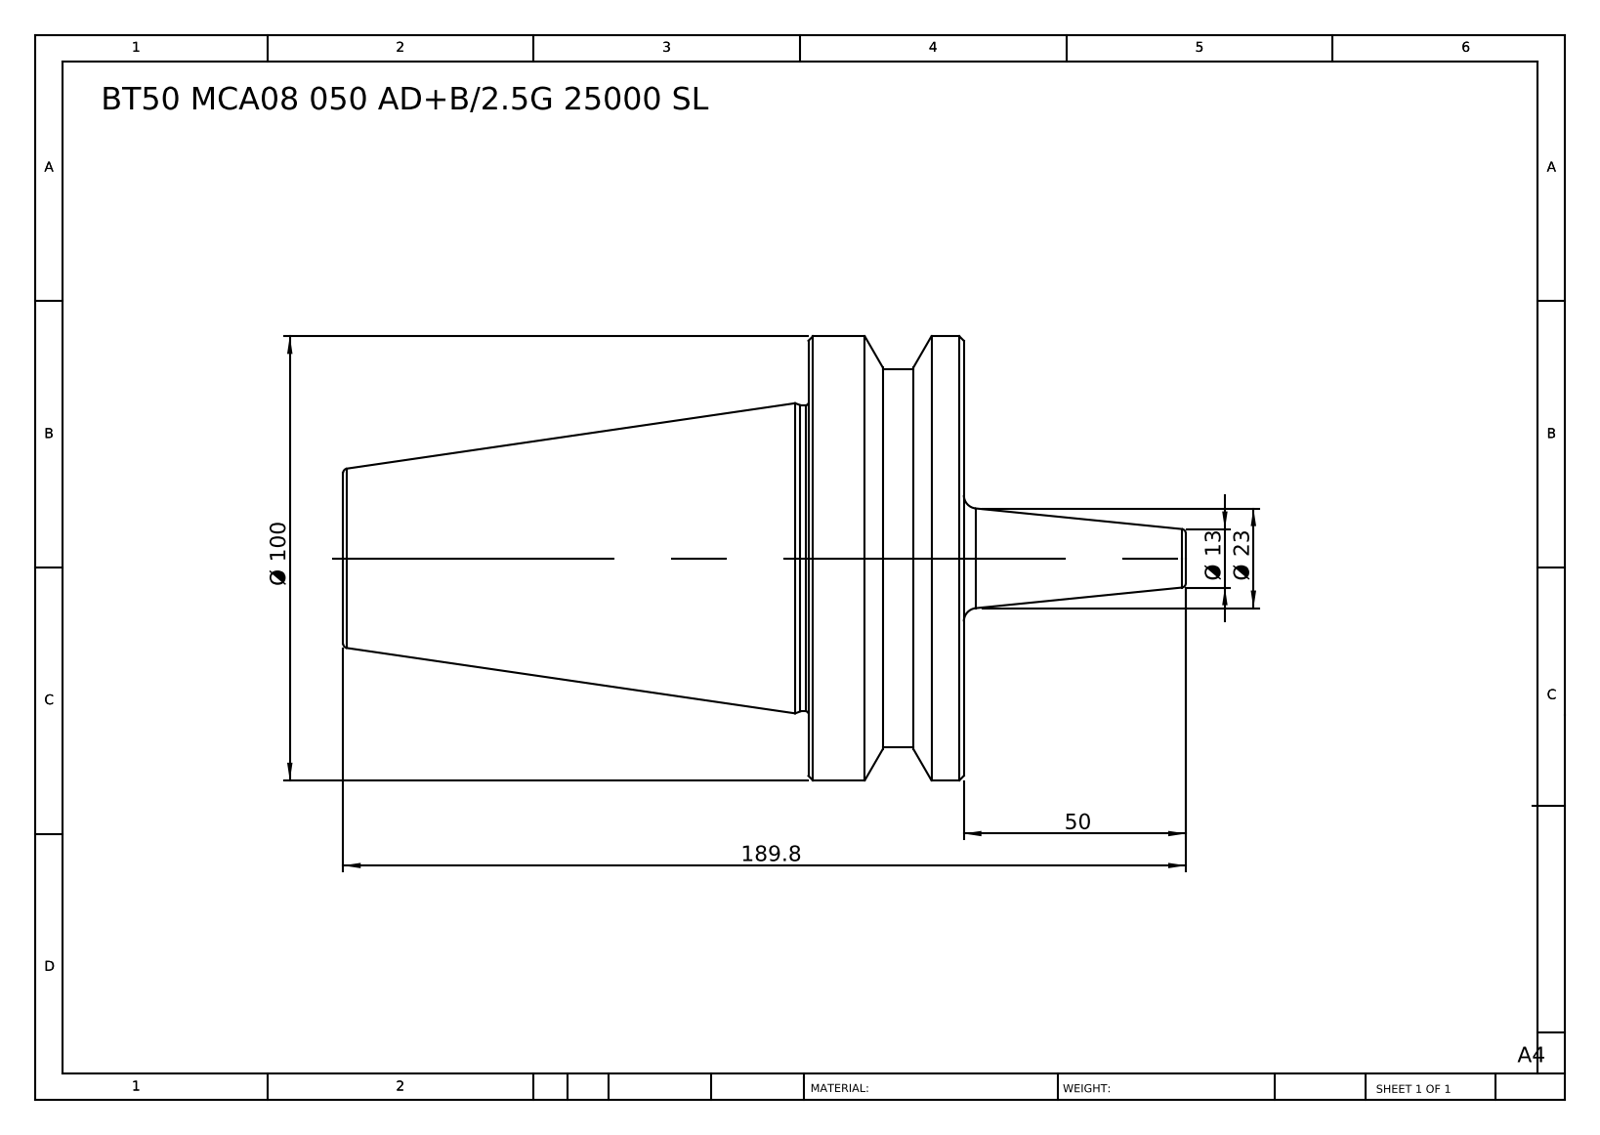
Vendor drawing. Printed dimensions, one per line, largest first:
189.8
Ø 100
50
Ø 23
Ø 13
